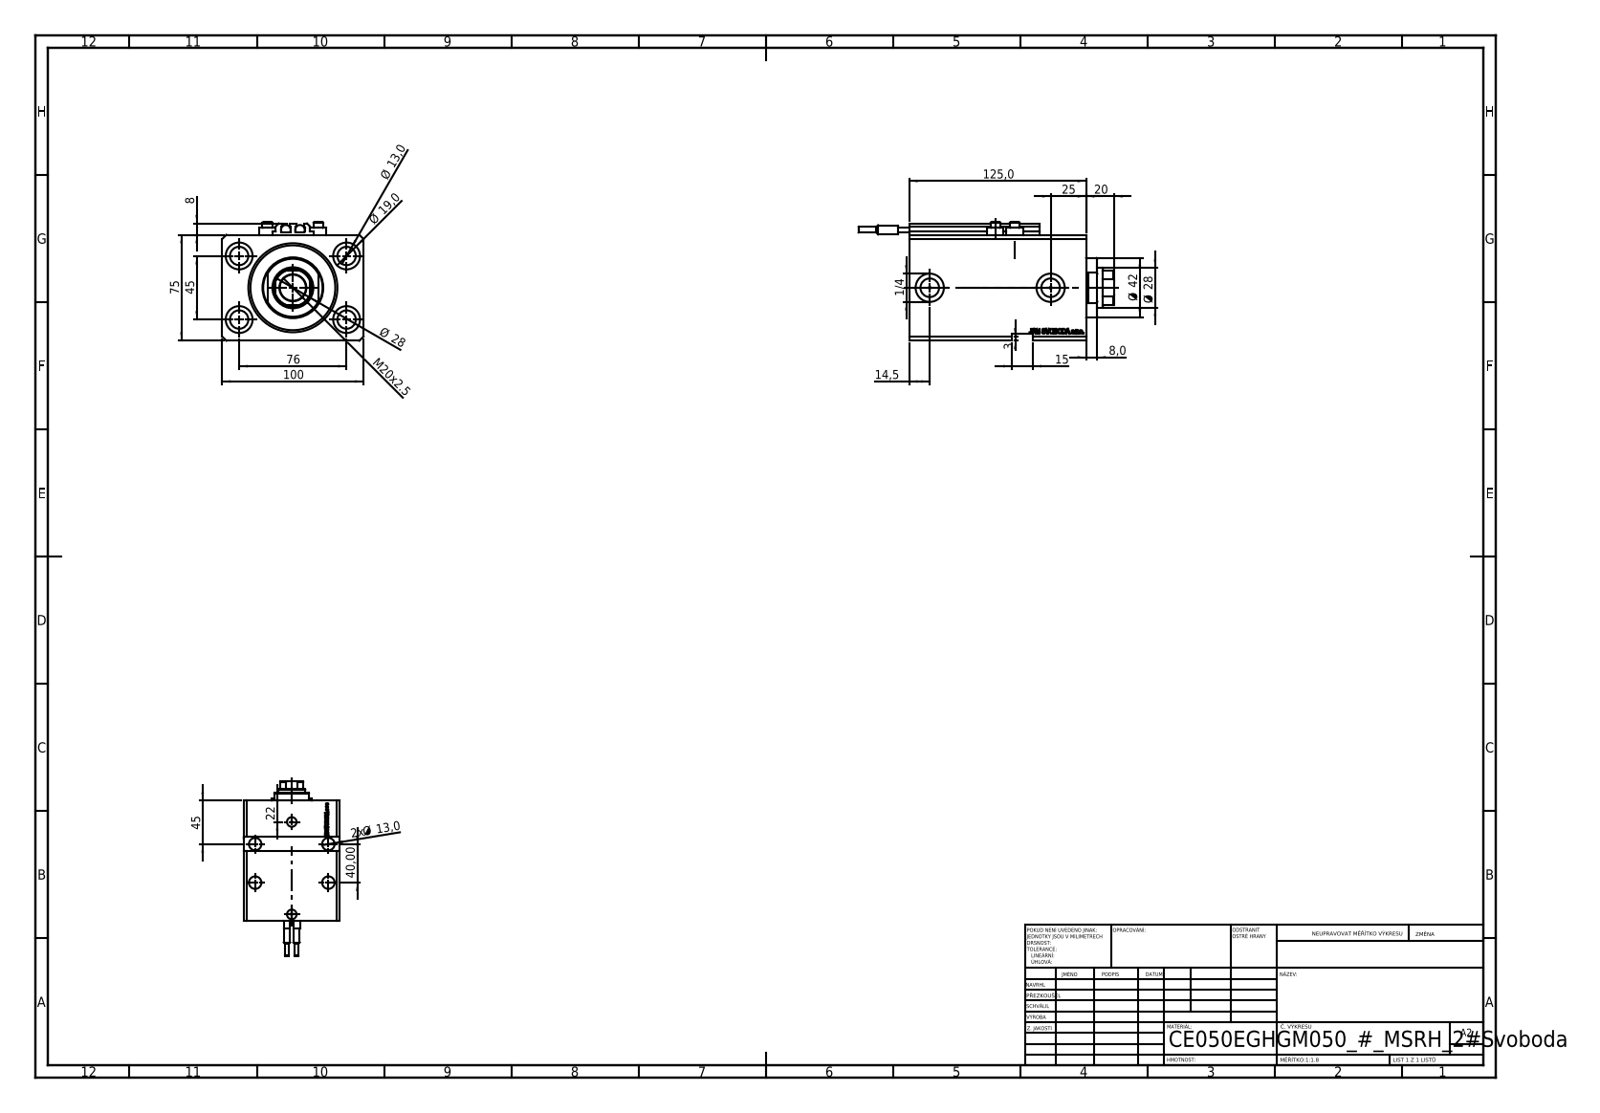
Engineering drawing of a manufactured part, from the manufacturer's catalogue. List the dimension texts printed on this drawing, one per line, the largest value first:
125,0
100
76
75
45
45
Ø 42
40,00
Ø 28
Ø 28
25
22
M20x2.5
20
Ø 19,0
15
14,5
Ø 13,0
2x Ø 13,0
8
8,0
3
1/4
